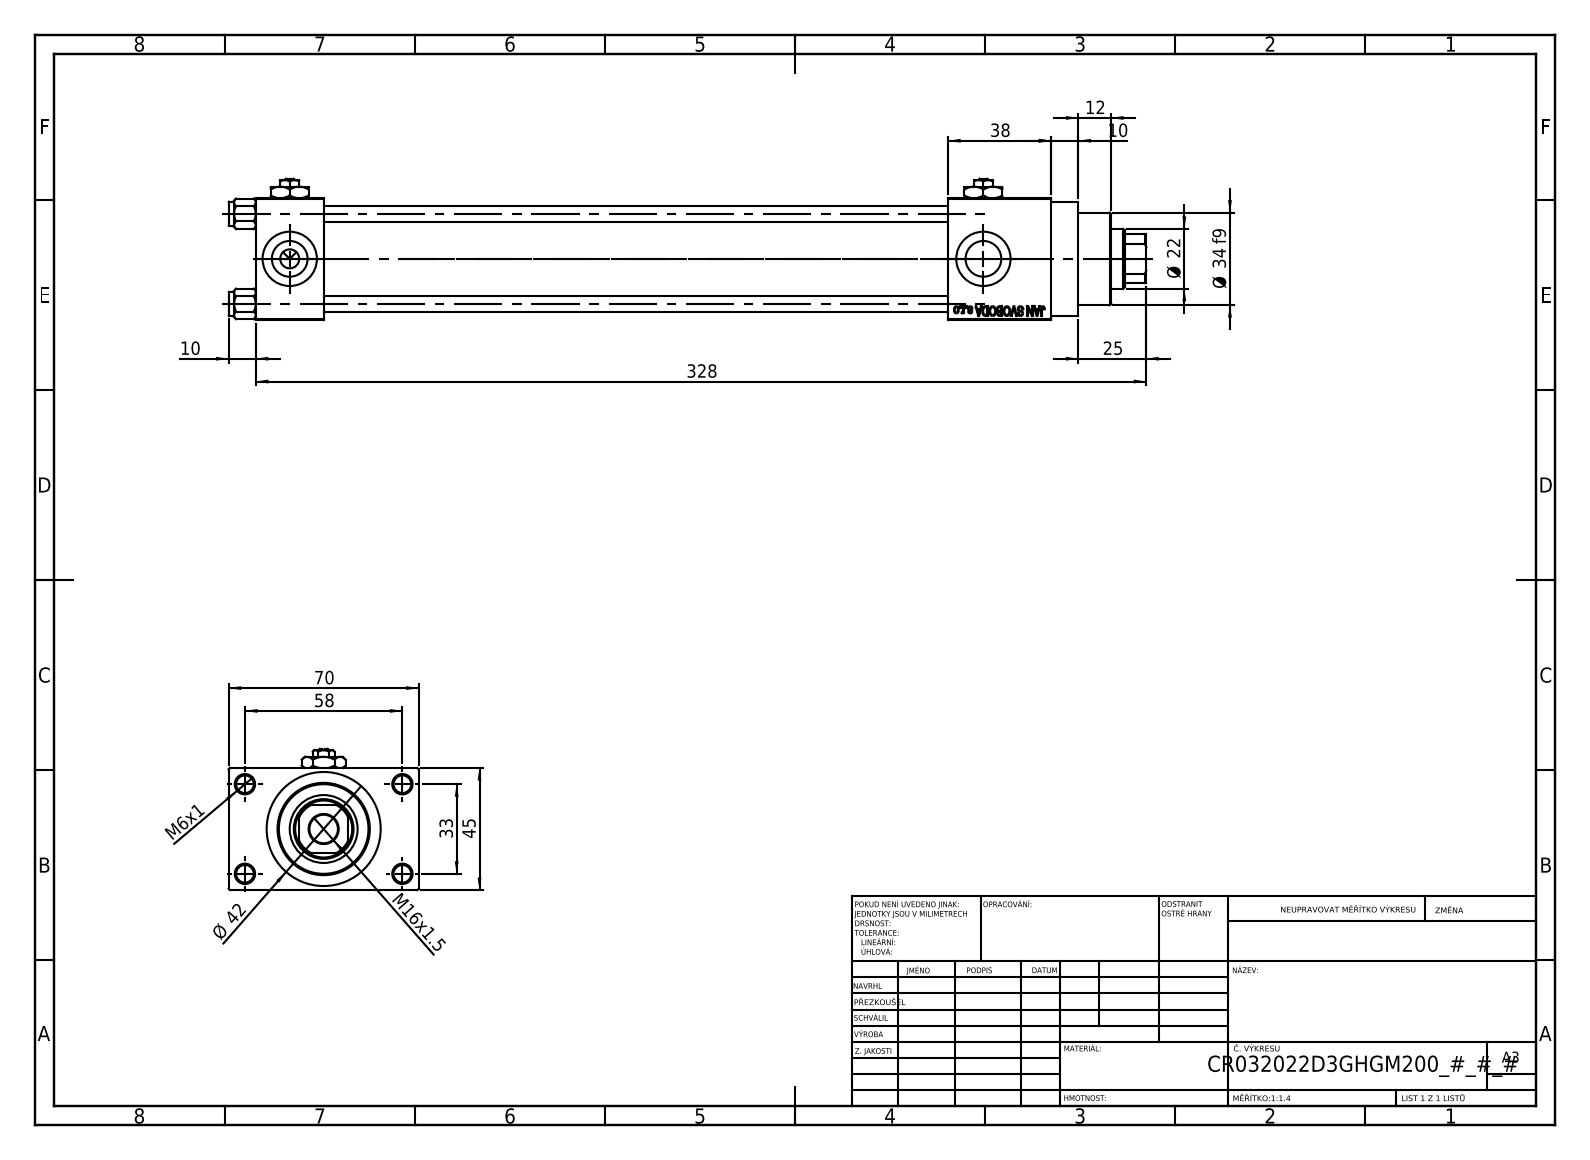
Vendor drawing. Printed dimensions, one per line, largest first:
328
70
58
45
Ø 42
38
Ø 34 f9
33
25
Ø 22
M16x1.5
12
10
10
M6x1
